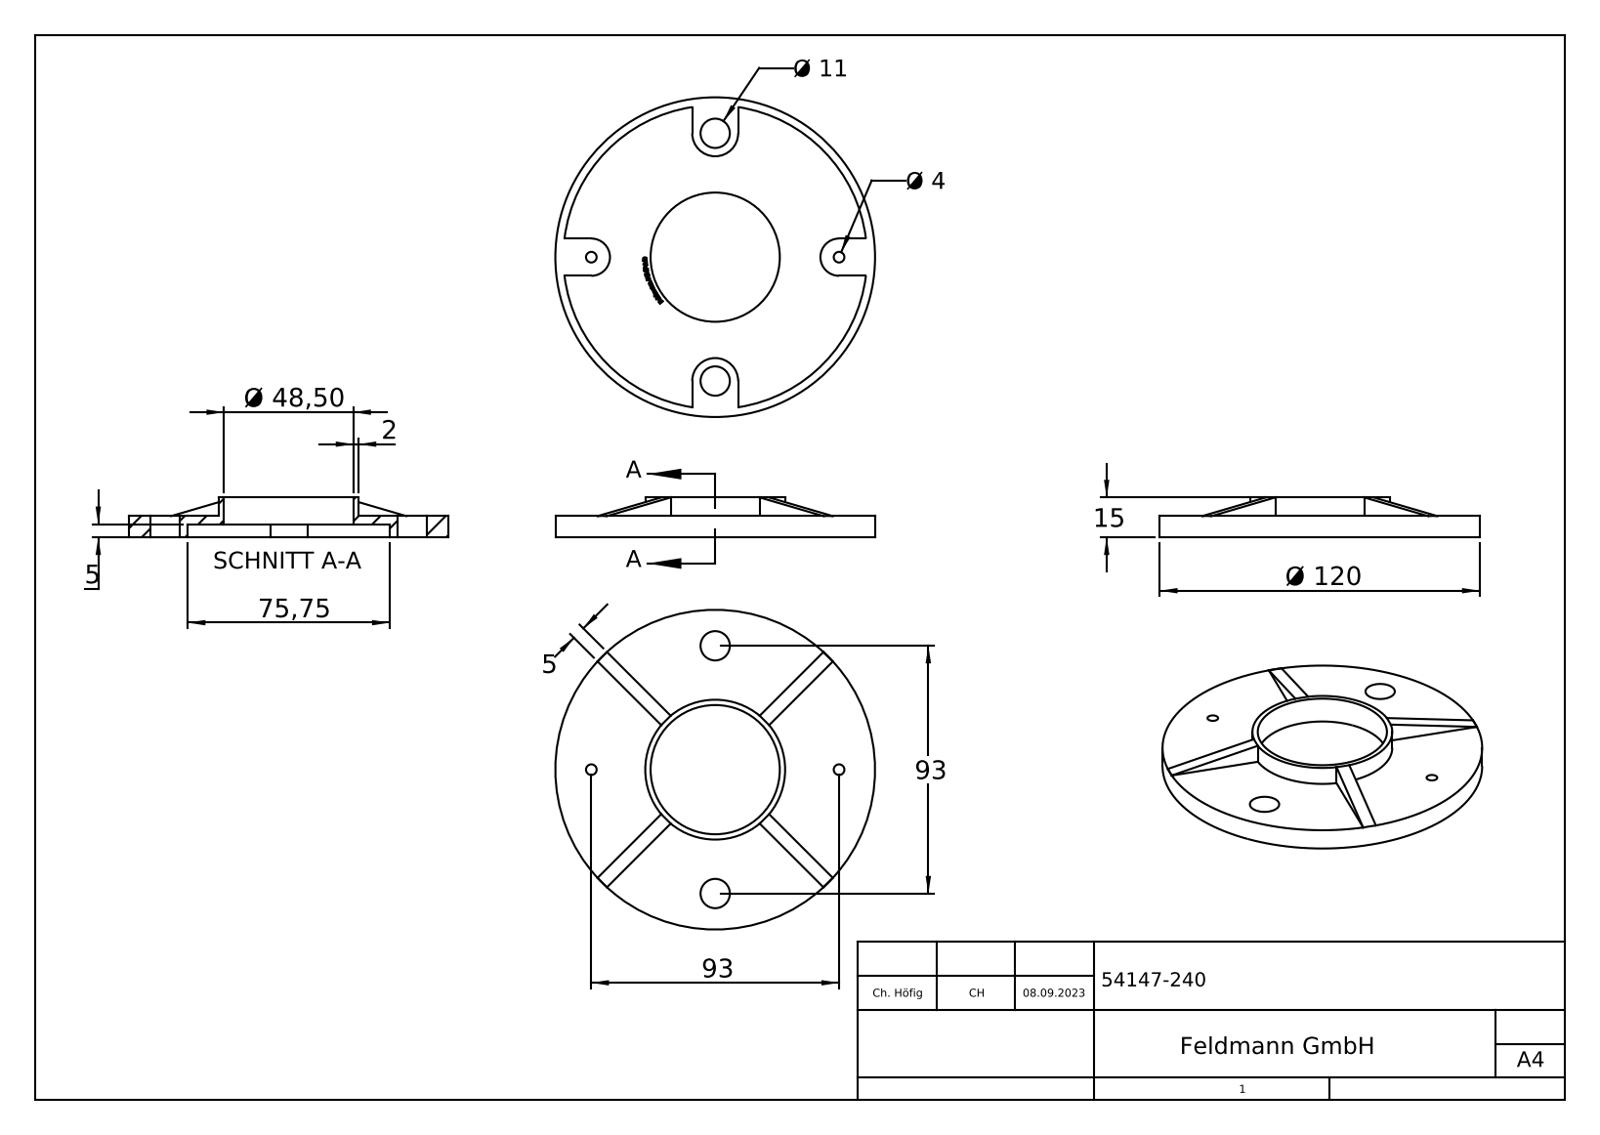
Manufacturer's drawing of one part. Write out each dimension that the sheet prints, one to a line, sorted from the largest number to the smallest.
Ø 120
93
93
75,75
Ø 48,50
15
Ø 11
5
5
Ø 4
2
